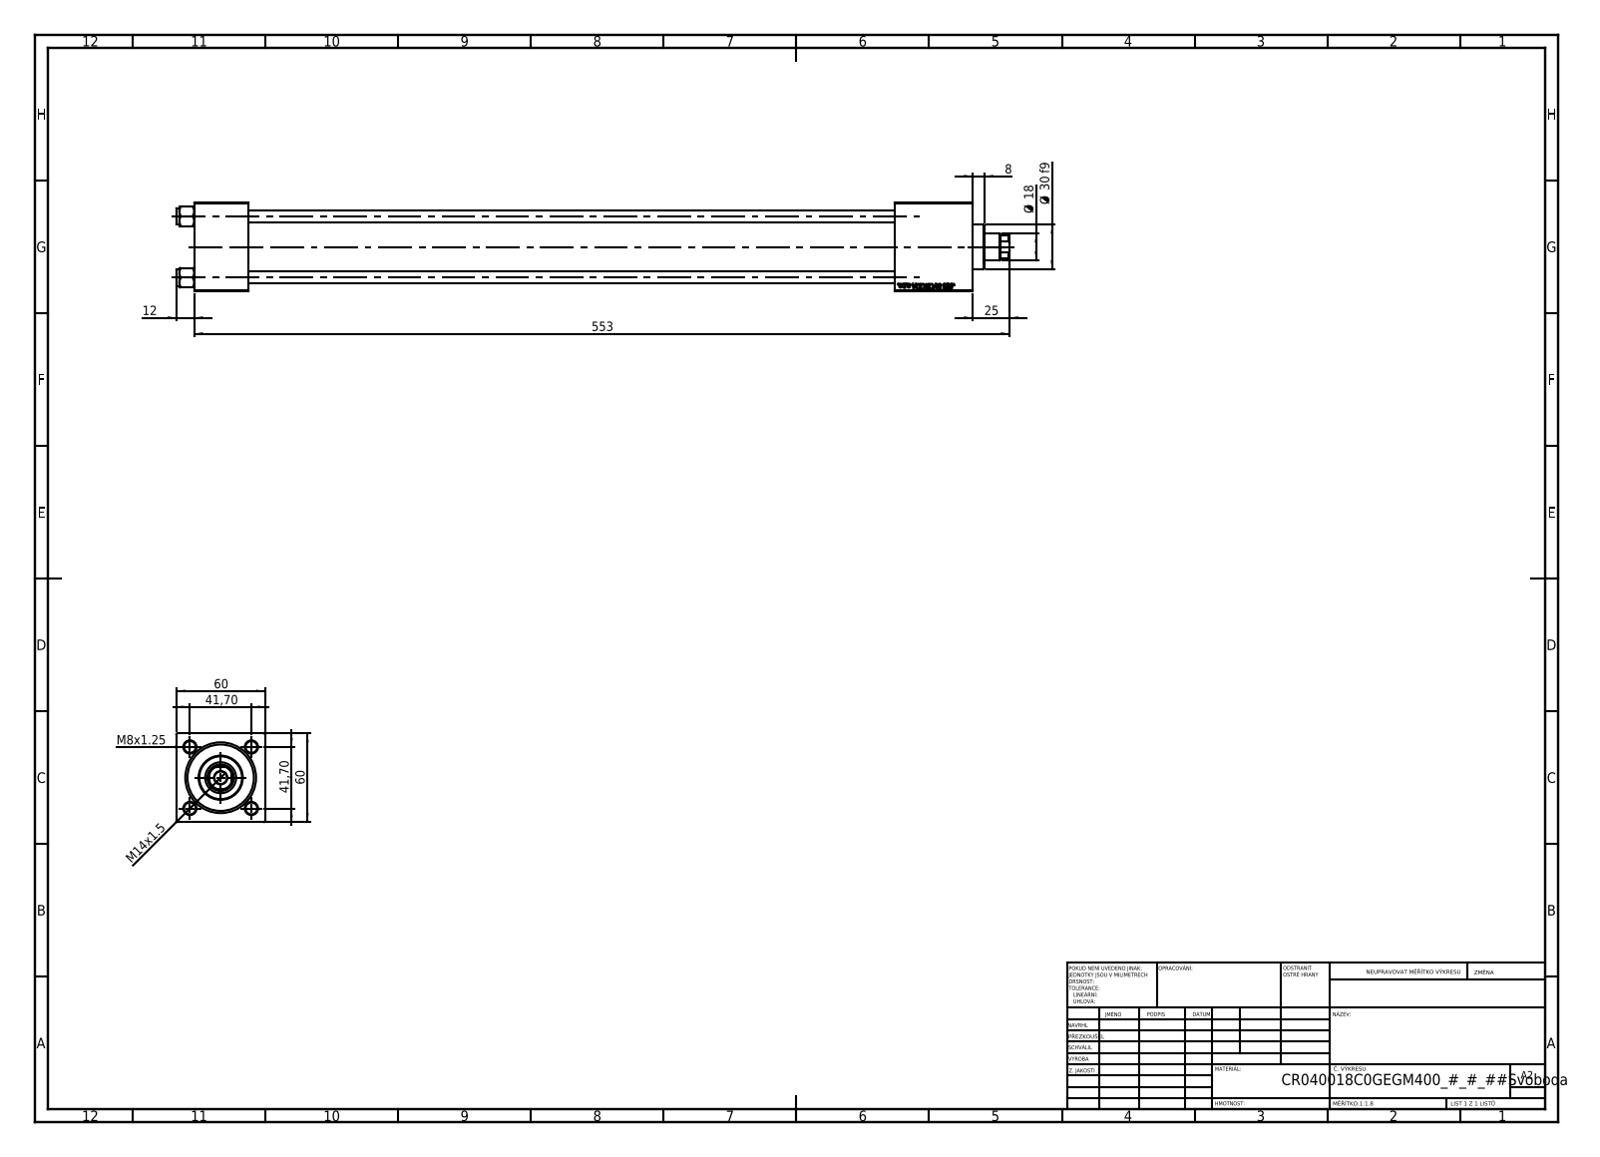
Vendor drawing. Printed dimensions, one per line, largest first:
553
60
60
41,70
41,70
Ø 30 f9
25
Ø 18
M14x1.5
12
8
M8x1.25
